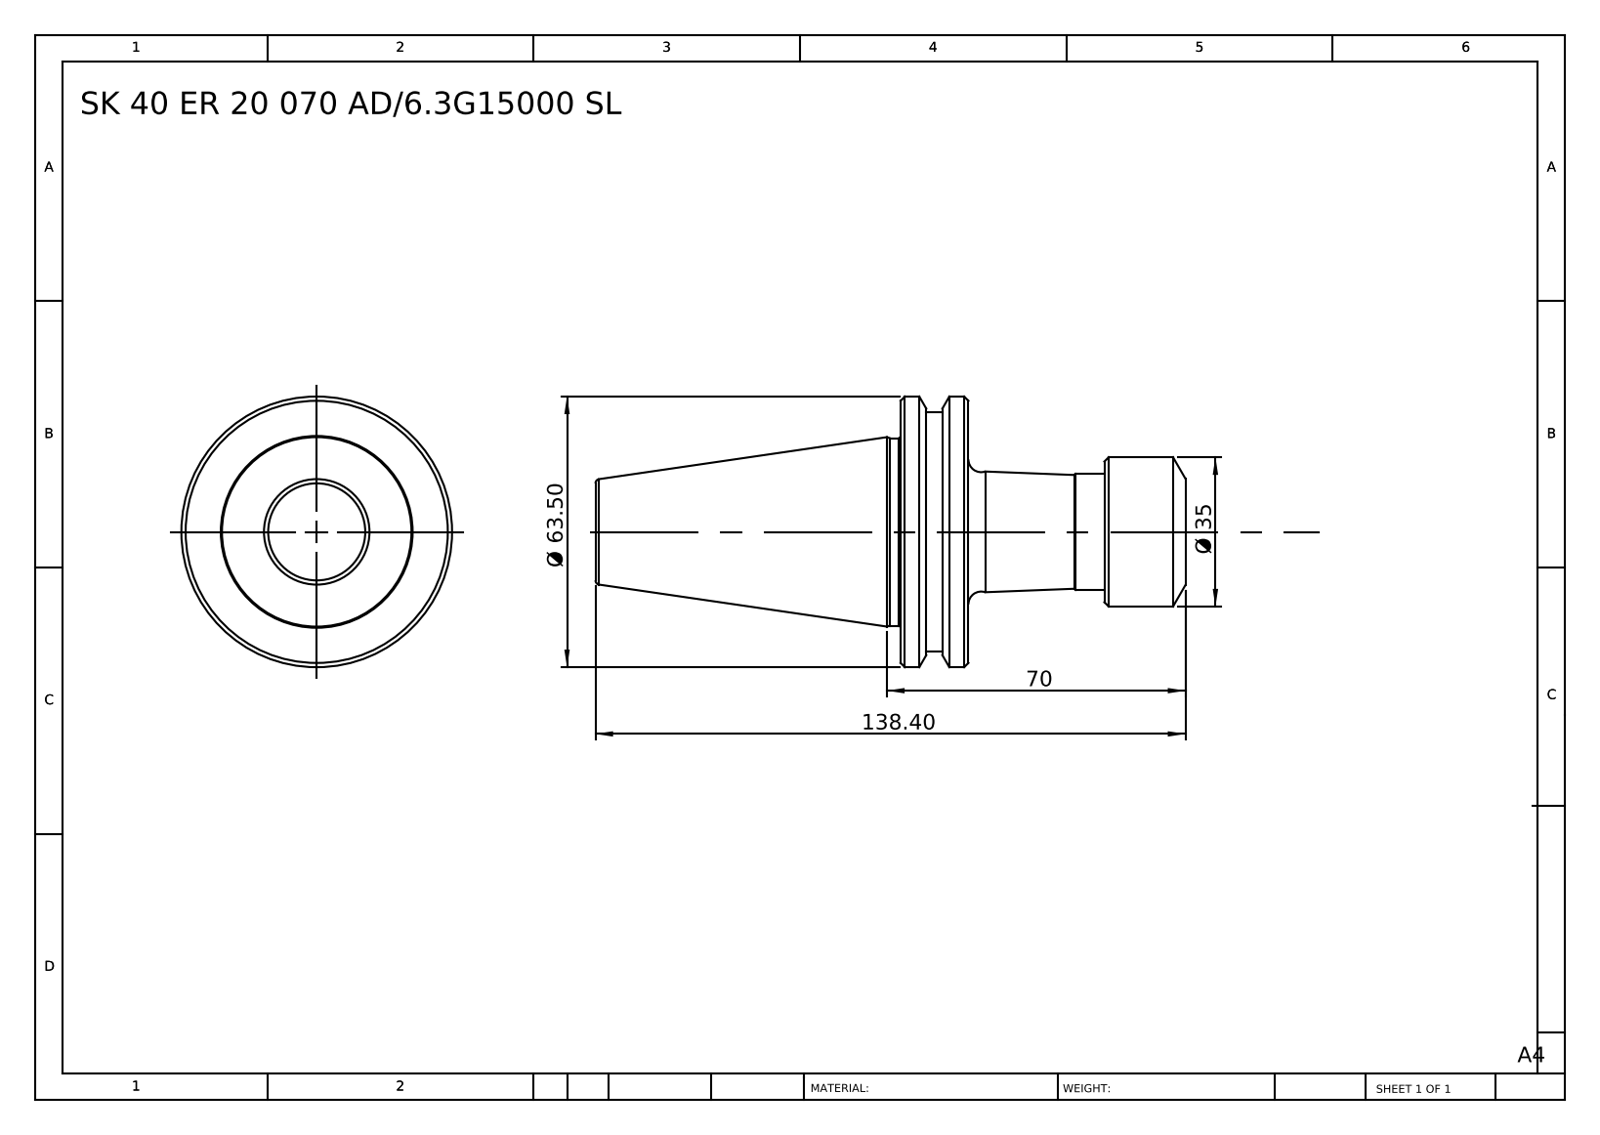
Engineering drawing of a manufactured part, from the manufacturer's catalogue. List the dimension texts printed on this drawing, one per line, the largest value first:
138.40
70
Ø 63.50
Ø 35
